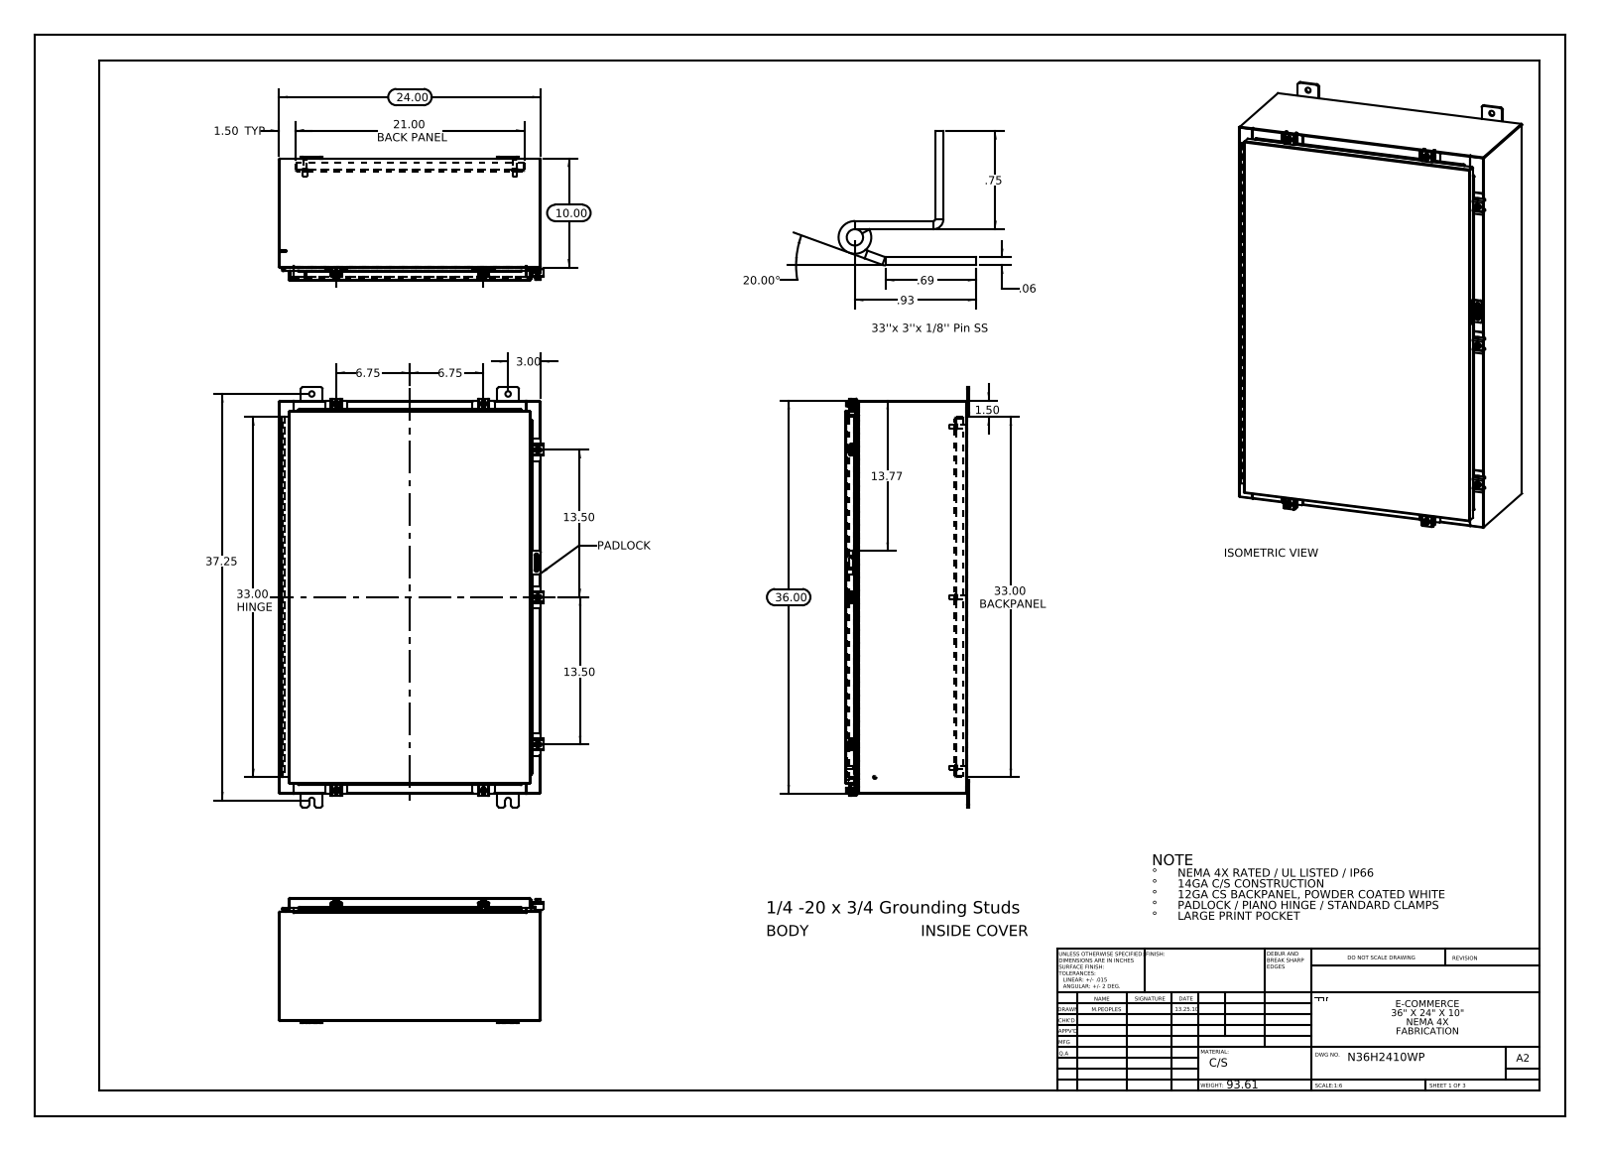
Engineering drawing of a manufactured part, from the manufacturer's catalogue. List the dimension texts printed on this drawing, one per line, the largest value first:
37.25
36.00
33.00 HINGE
33.00 BACKPANEL
24.00
21.00 BACK PANEL
20.00°
13.77
13.50
13.50
10.00
6.75
6.75
3.00
1.50 TYP
1.50
.93
.75
.69
.06
